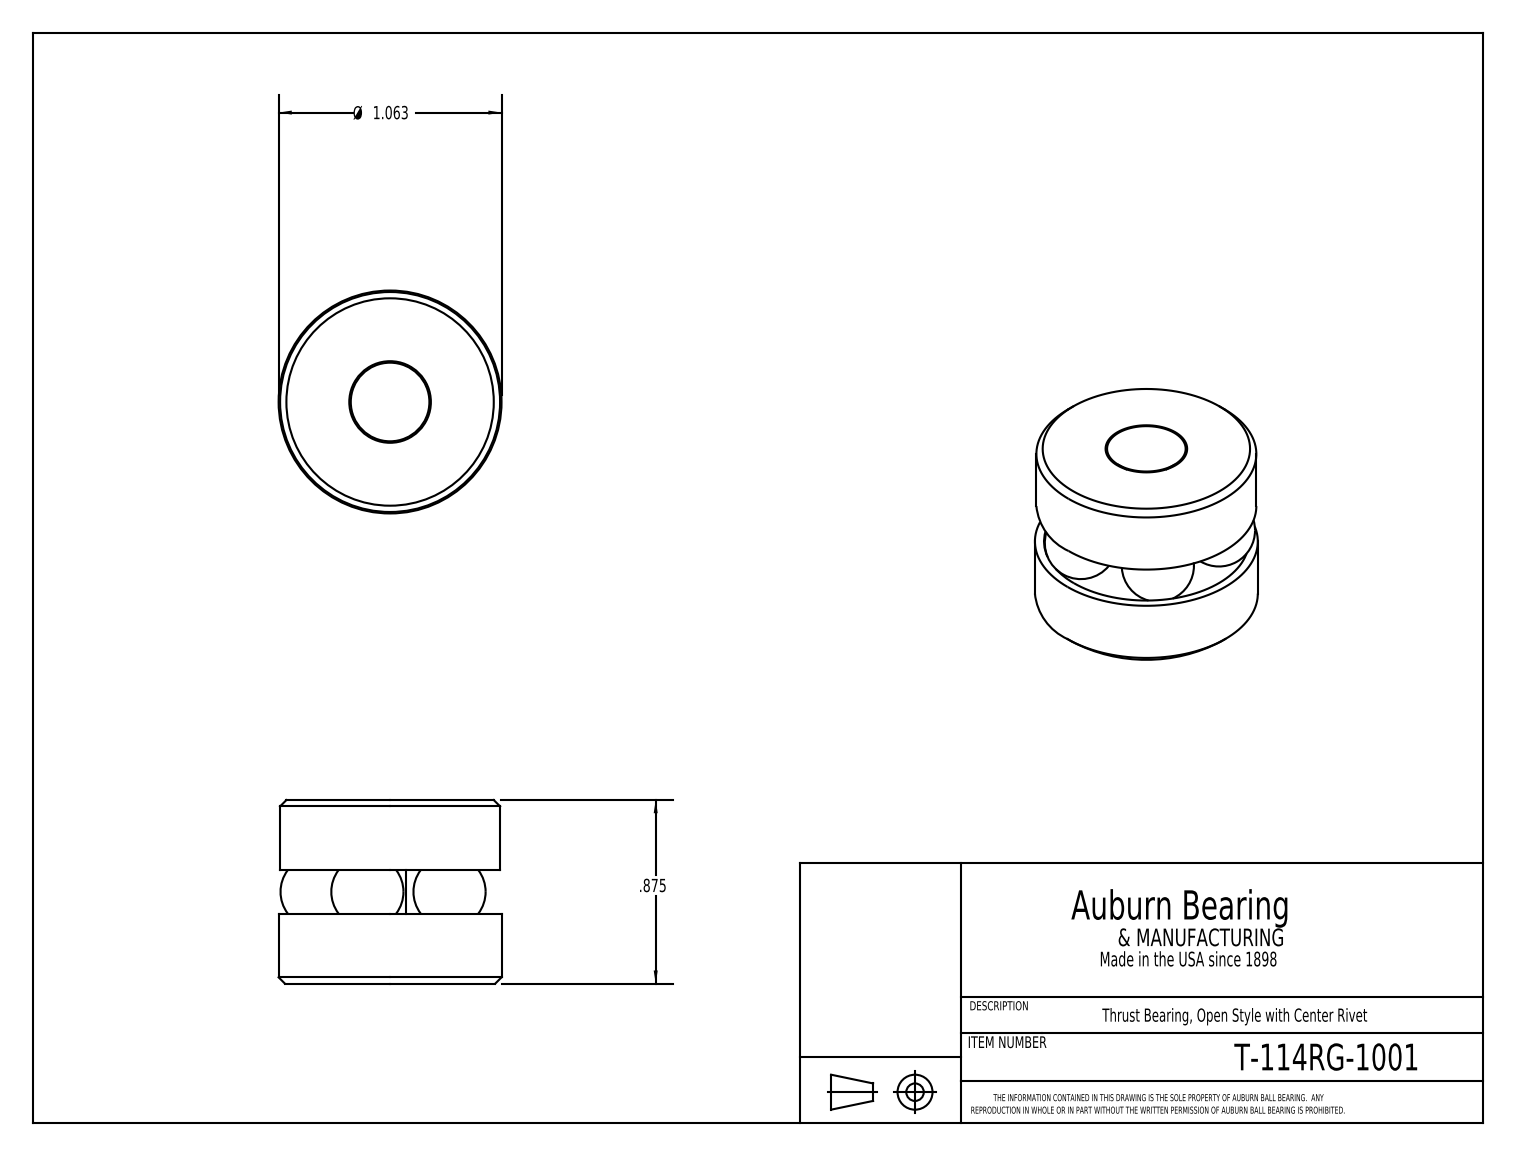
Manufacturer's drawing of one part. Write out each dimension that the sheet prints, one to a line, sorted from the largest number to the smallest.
Ø 1.063
.875
